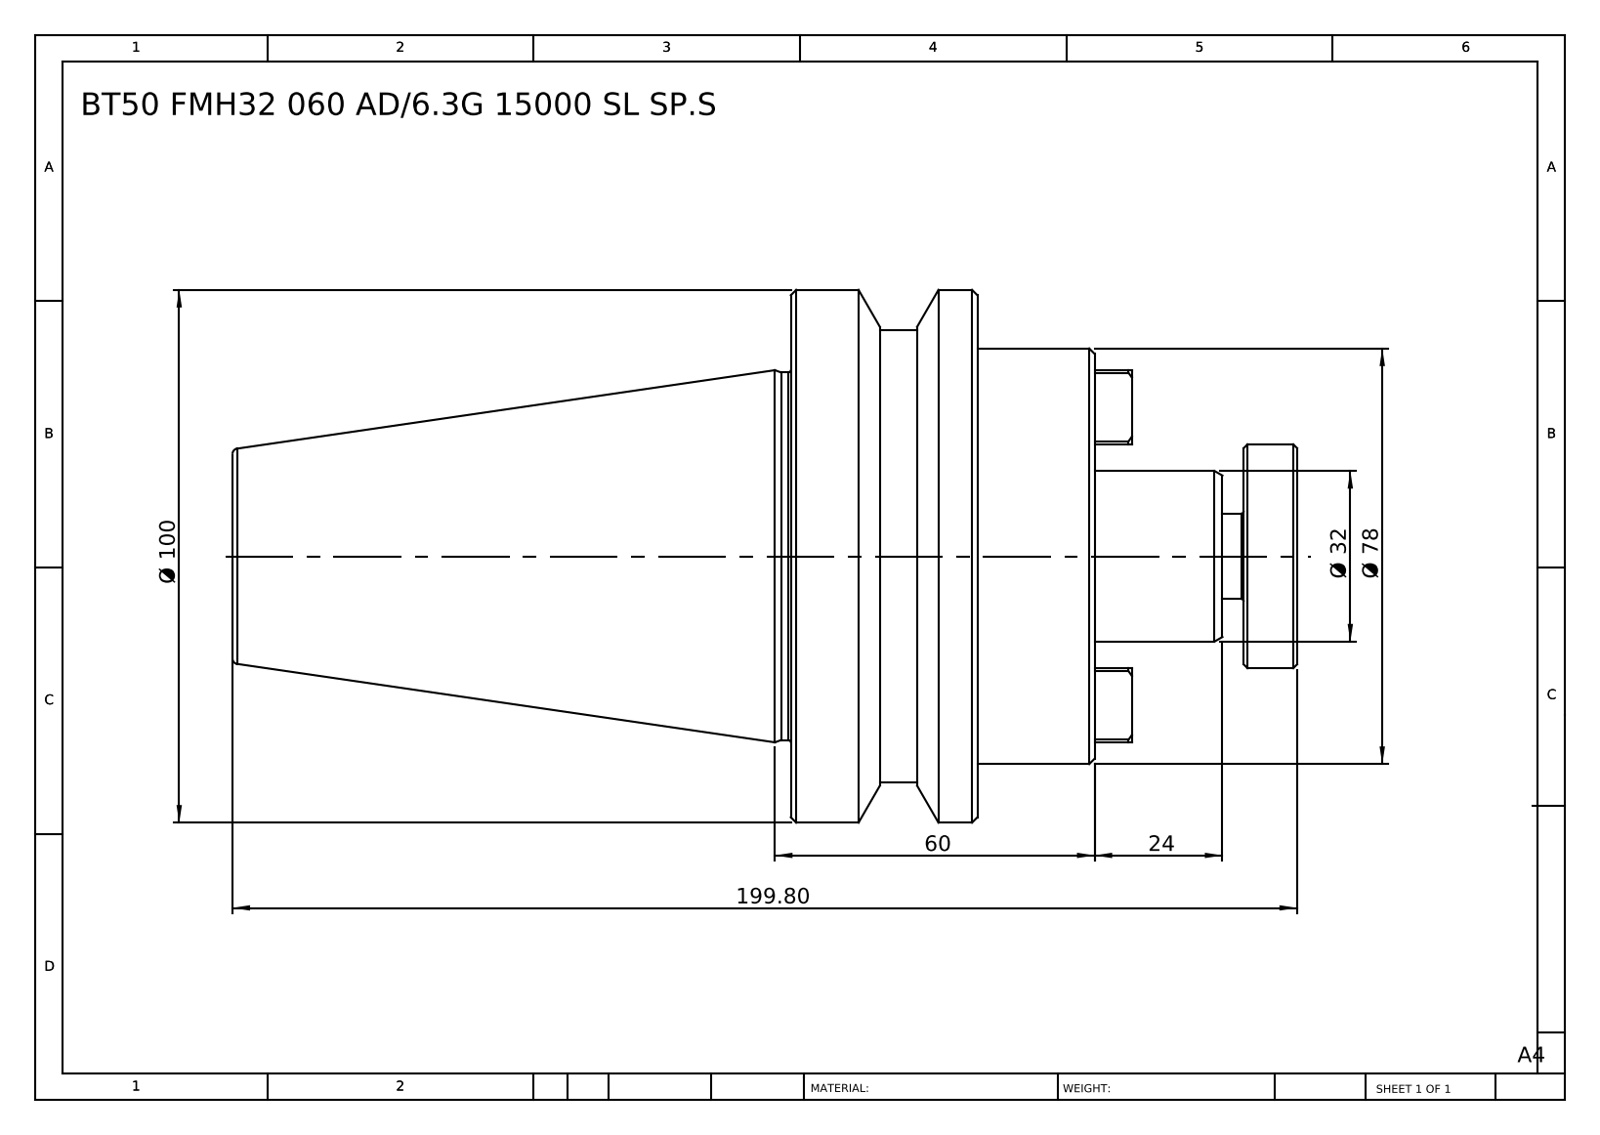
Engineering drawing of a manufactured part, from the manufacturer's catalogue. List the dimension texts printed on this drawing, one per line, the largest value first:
199.80
Ø 100
Ø 78
60
Ø 32
24
